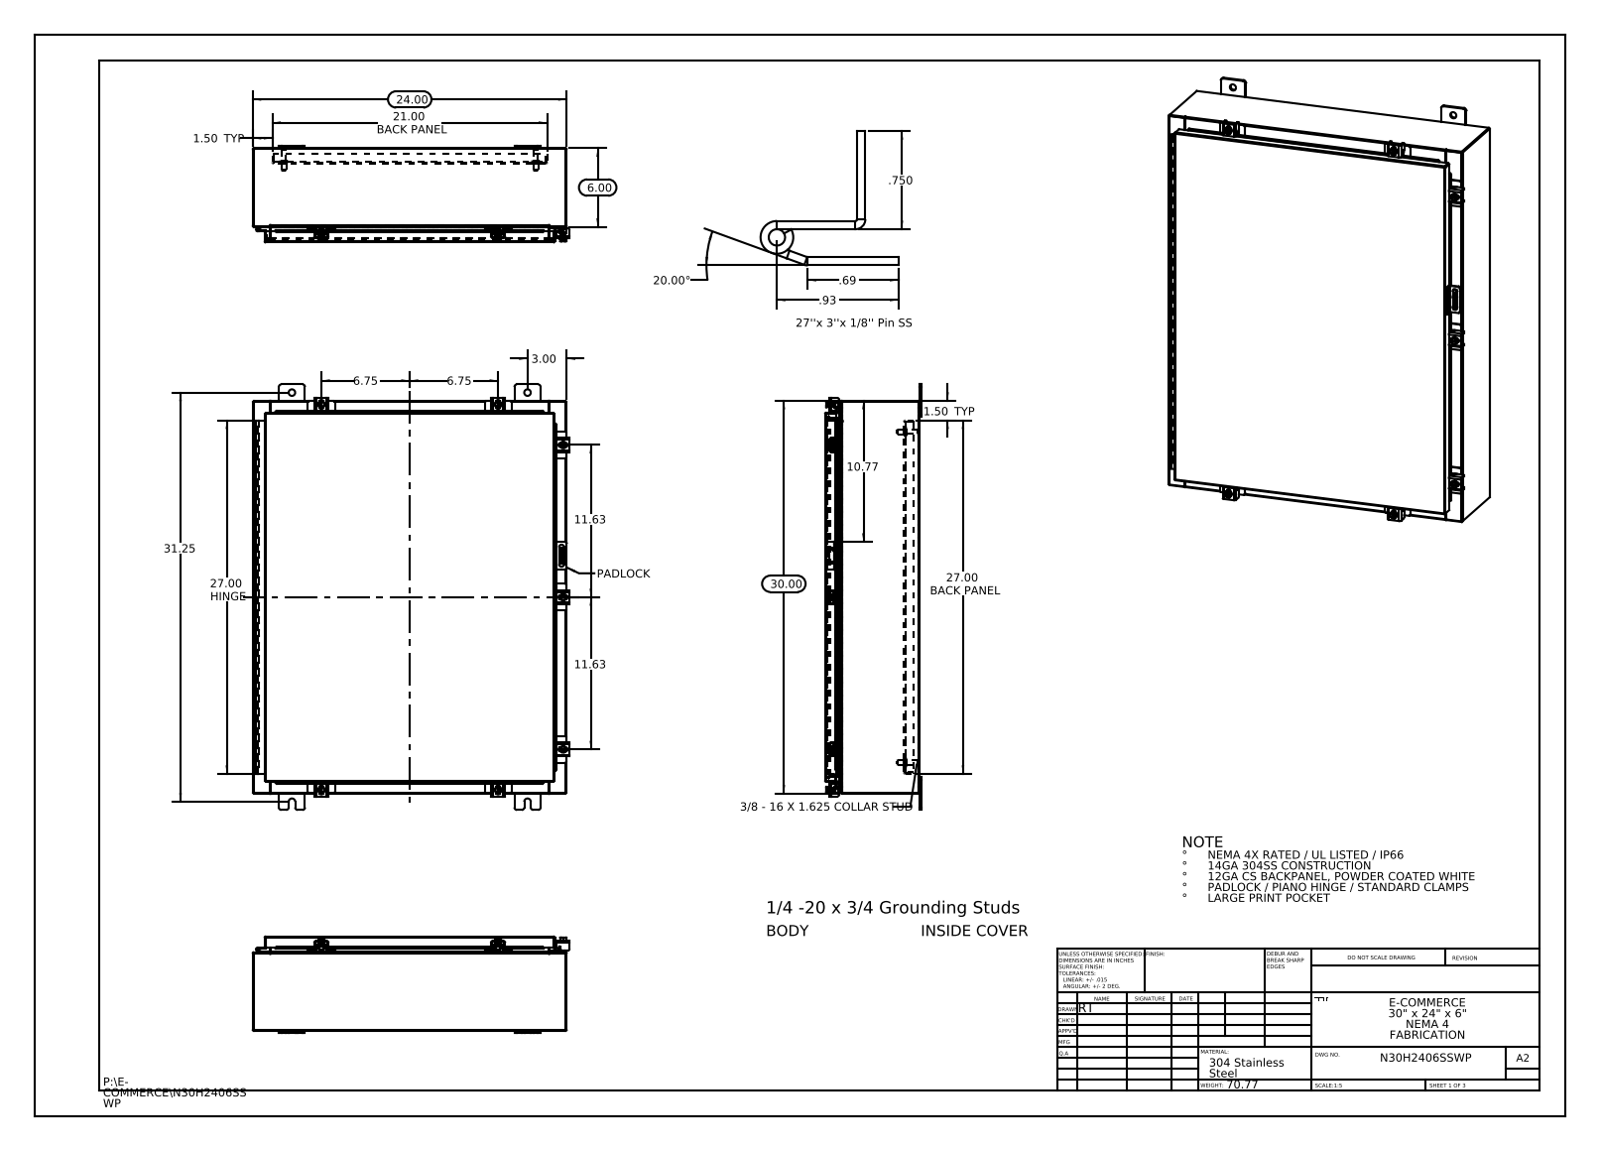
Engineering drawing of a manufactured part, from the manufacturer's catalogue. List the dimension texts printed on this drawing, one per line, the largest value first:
31.25
30.00
27.00 HINGE
27.00 BACK PANEL
24.00
21.00 BACK PANEL
20.00°
11.63
11.63
10.77
6.75
6.75
6.00
3.00
1.50 TYP
1.50 TYP
.93
.750
.69
